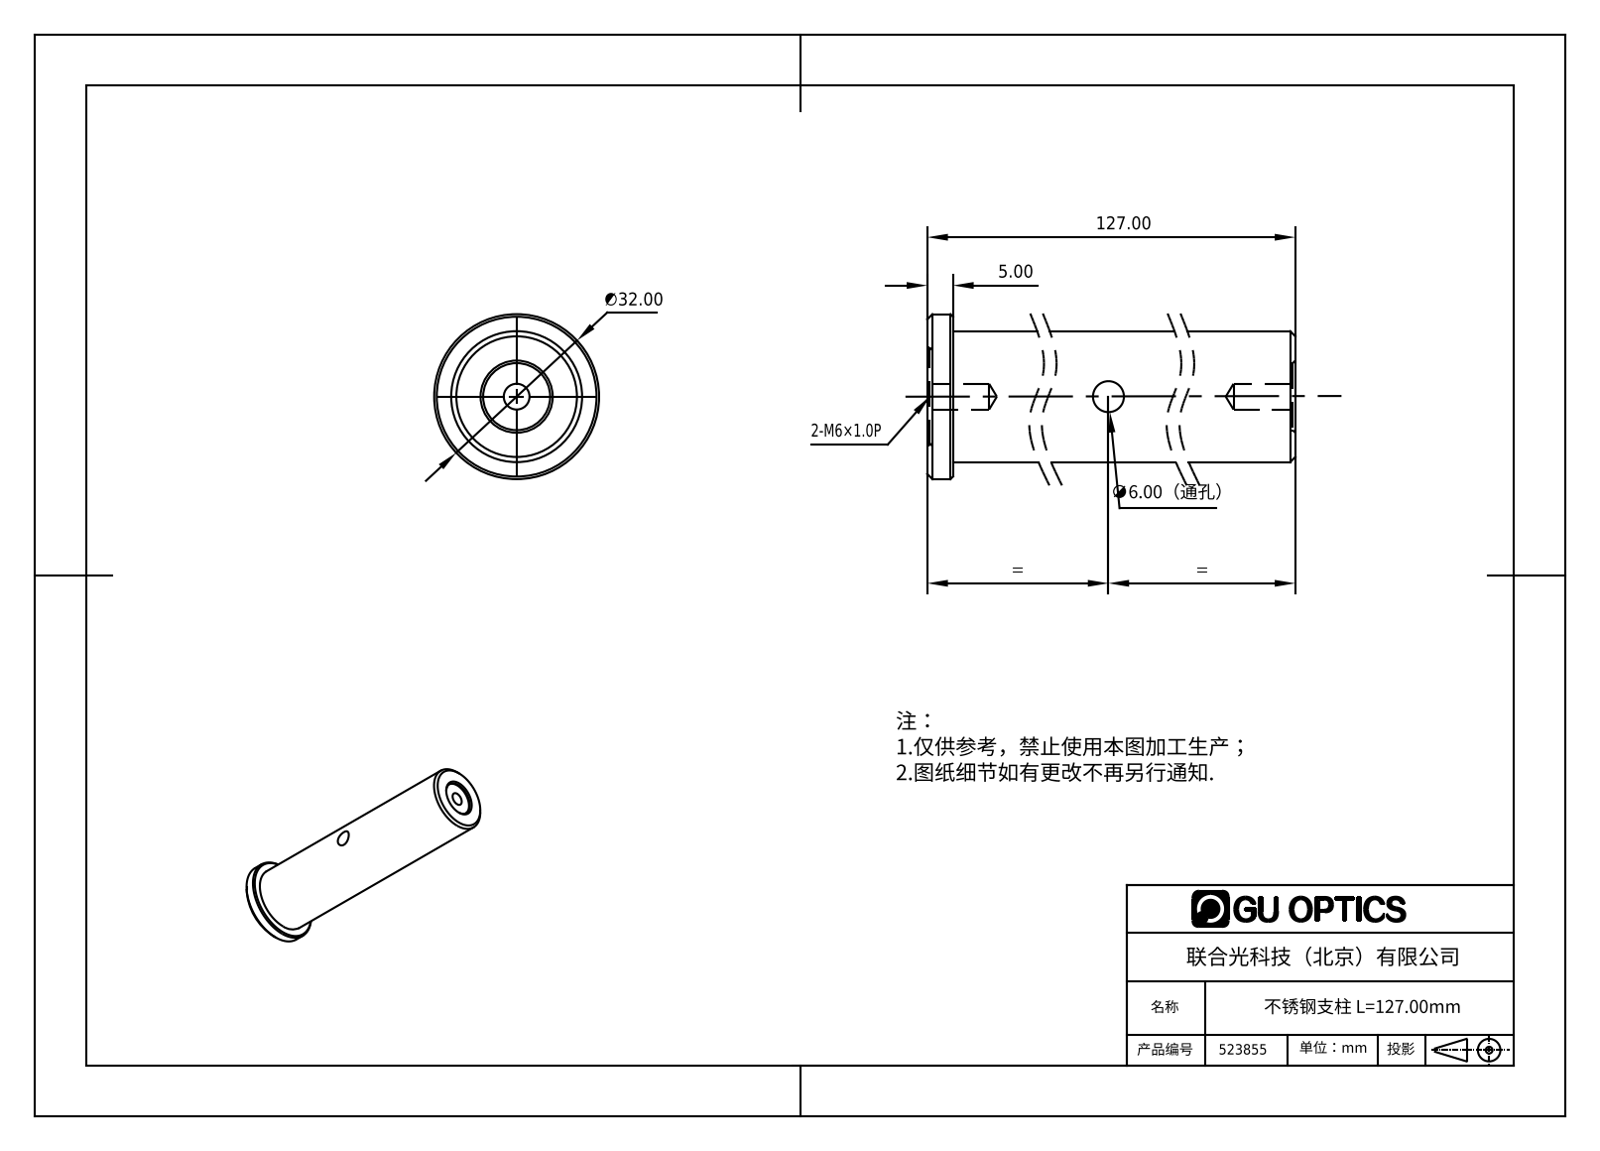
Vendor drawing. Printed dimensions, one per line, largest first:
127.00
∅32.00
∅6.00（通孔）
5.00
=
=
